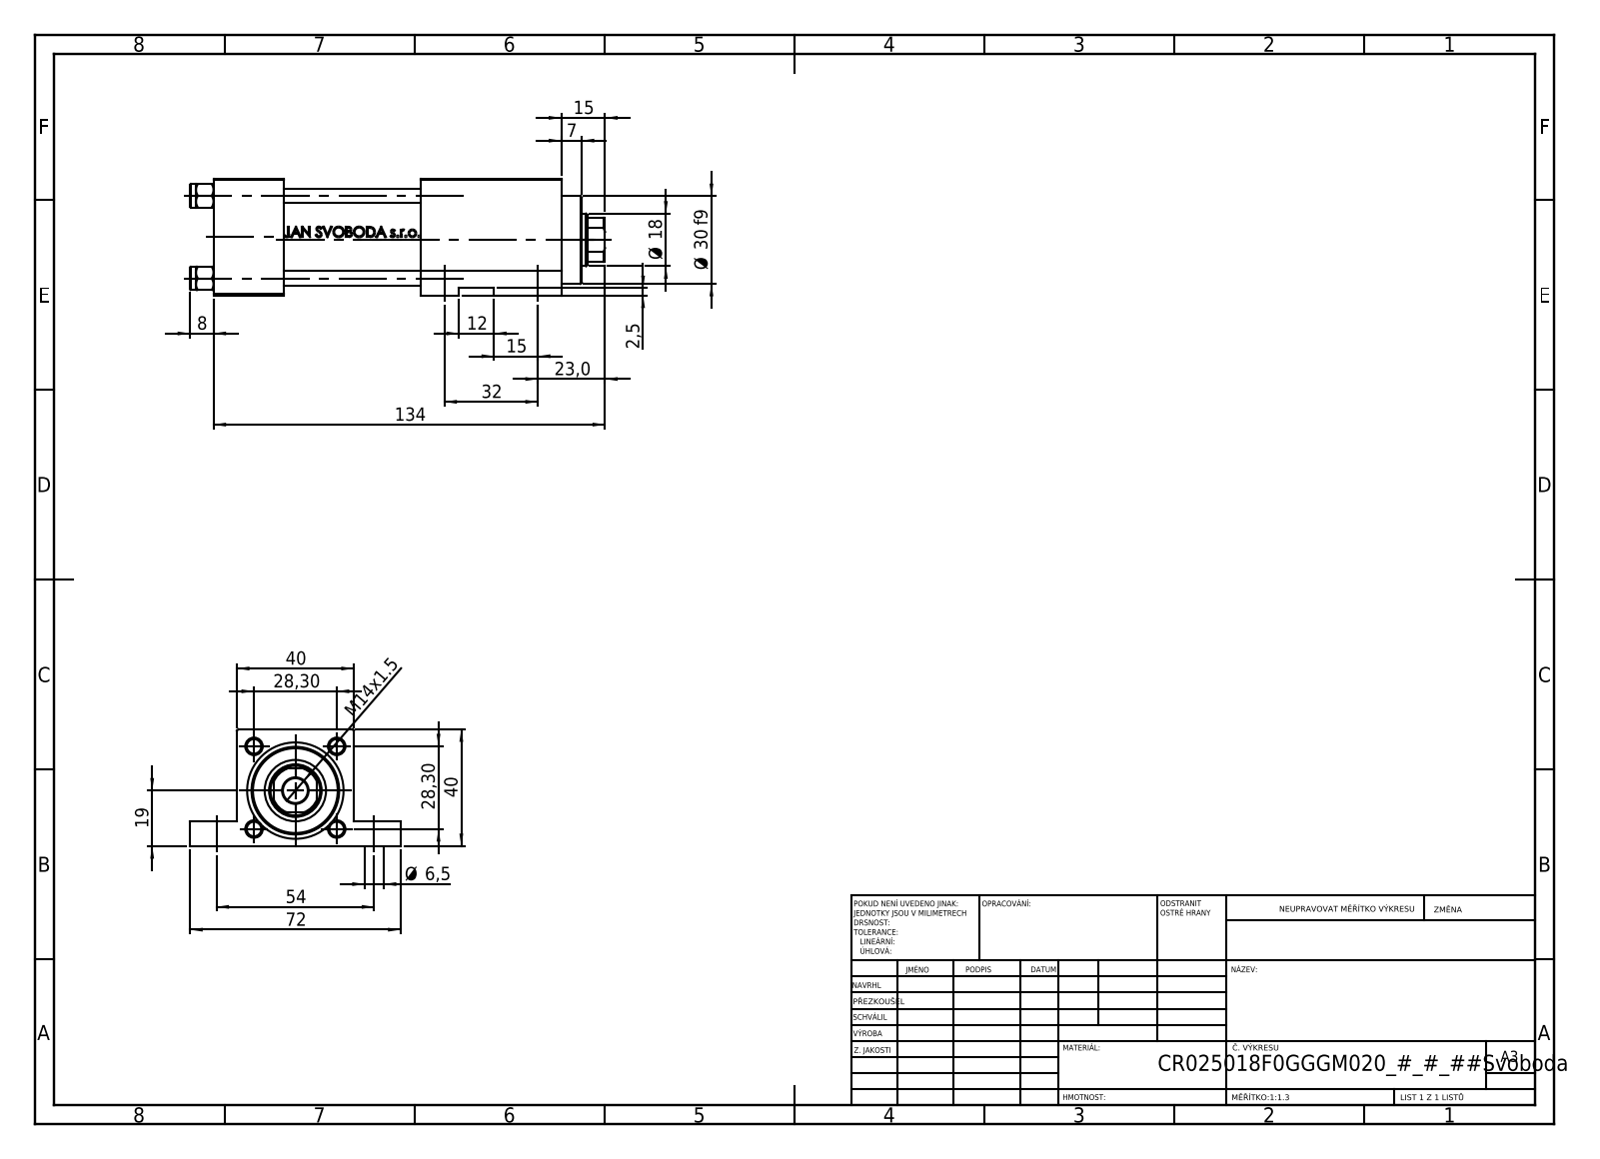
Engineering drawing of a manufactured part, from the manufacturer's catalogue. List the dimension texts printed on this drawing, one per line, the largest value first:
134
72
54
40
40
32
Ø 30 f9
28,30
28,30
23,0
19
Ø 18
15
15
M14x1.5
12
8
7
Ø 6,5
2,5
